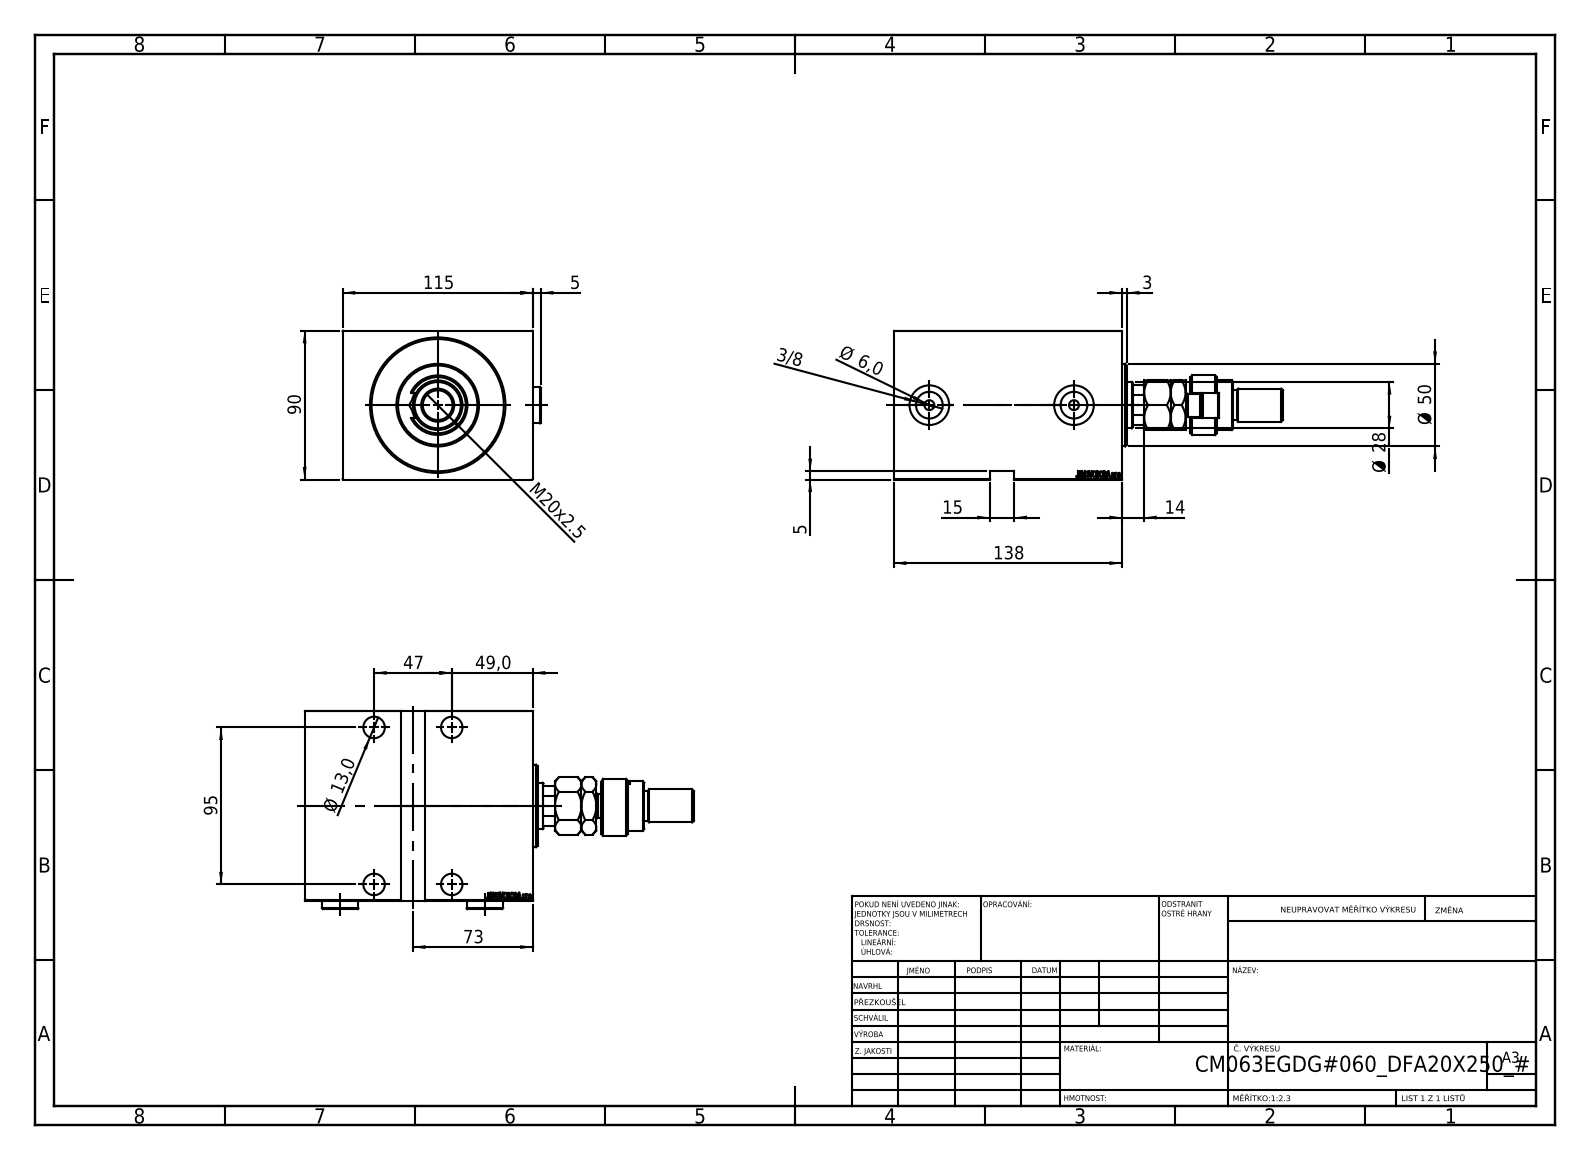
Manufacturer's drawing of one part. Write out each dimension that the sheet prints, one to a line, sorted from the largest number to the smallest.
138
115
95
90
73
Ø 50
49,0
47
Ø 28
M20x2.5
15
14
Ø 13,0
Ø 6,0
5
5
3
3/8
